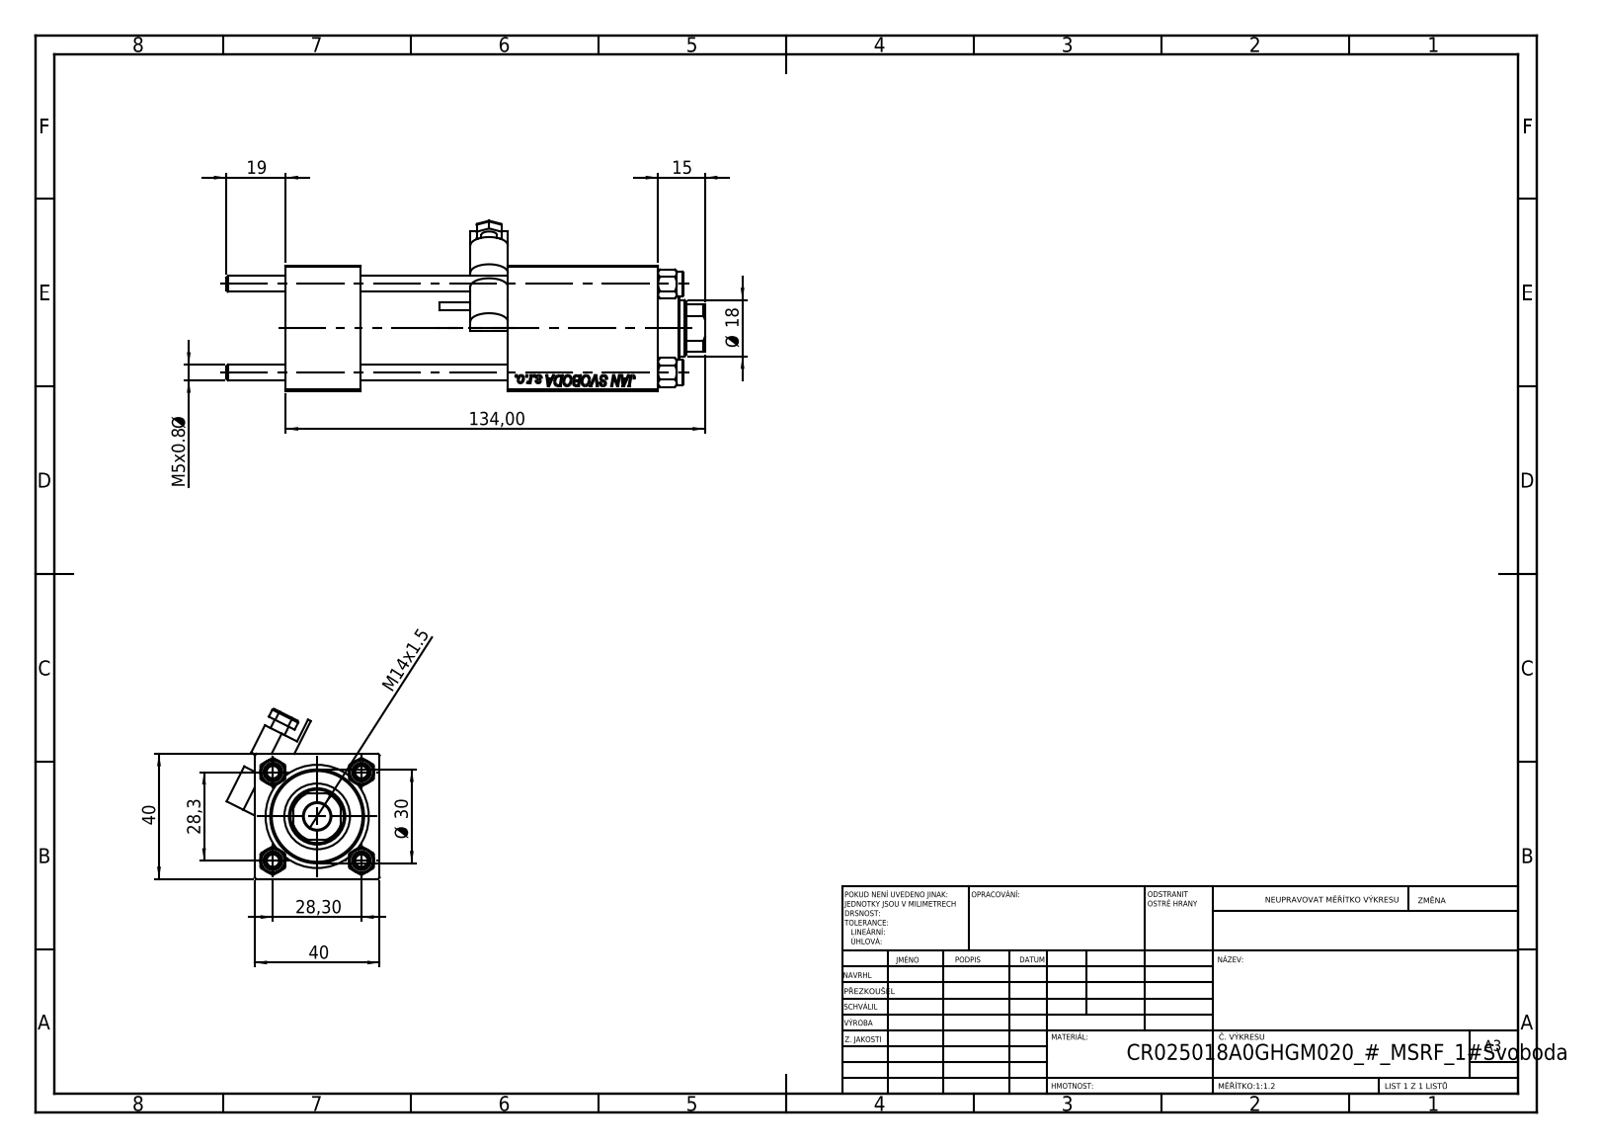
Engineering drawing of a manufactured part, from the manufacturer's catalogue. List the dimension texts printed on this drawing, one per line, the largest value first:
134,00
40
40
Ø 30
28,3
28,30
19
Ø 18
15
M14x1.5
M5x0.8 Ø
